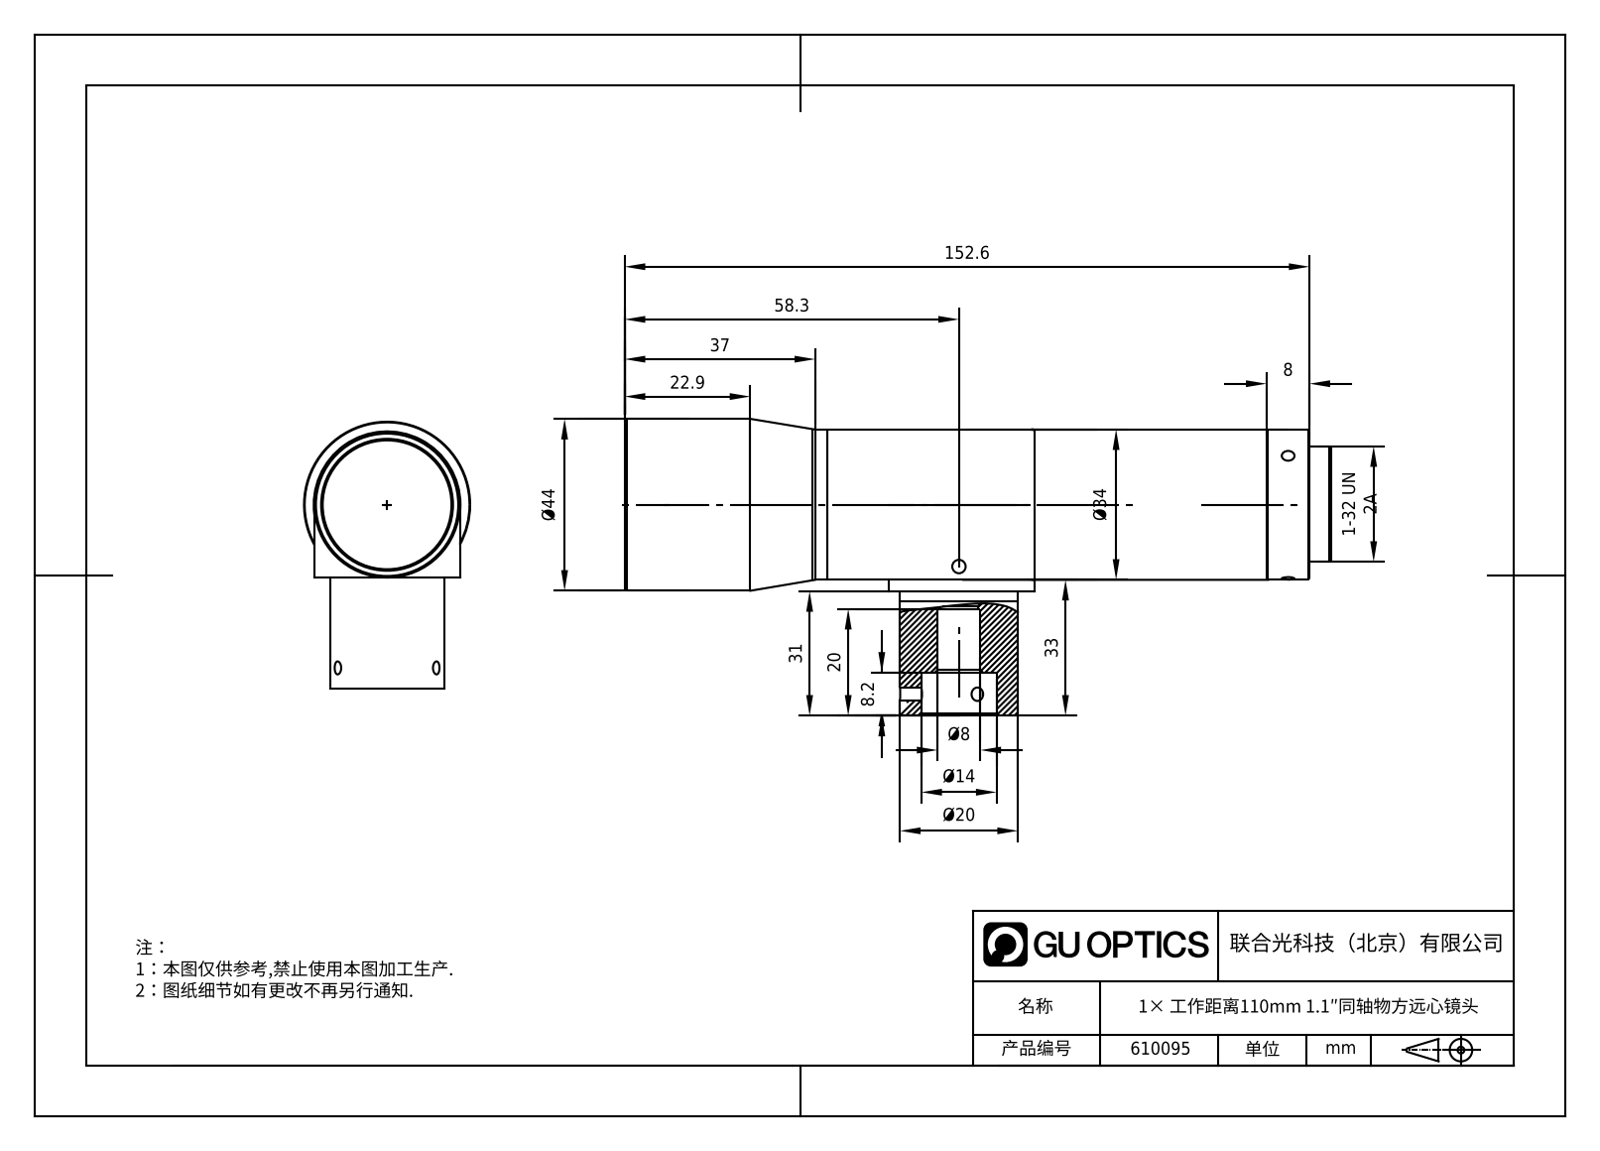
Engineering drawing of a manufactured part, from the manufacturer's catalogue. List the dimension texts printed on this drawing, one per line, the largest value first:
152.6
58.3
Ø44
37
Ø34
33
31
22.9
Ø20
20
Ø14
8.2
Ø8
8
1-32 UN 2A
